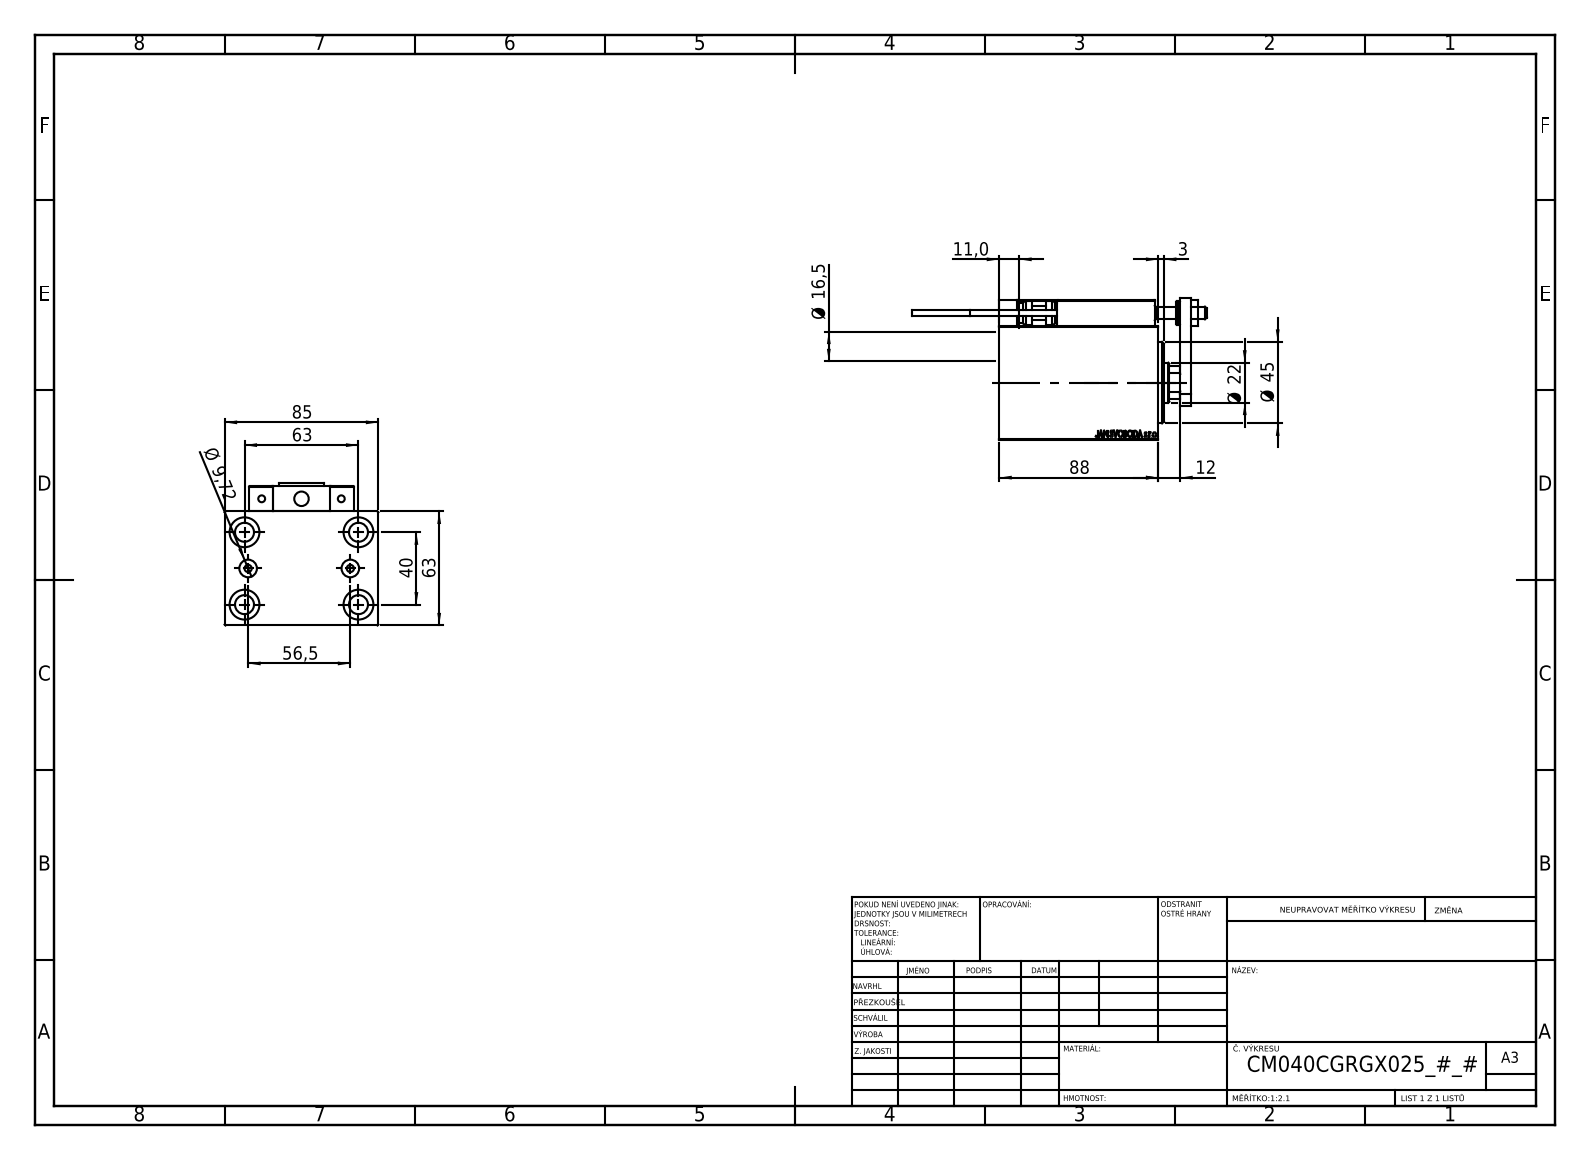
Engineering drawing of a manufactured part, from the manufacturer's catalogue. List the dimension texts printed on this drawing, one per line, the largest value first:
88
85
63
63
56,5
Ø 45
40
Ø 22
Ø 16,5
12
11,0
Ø 9,72
3
